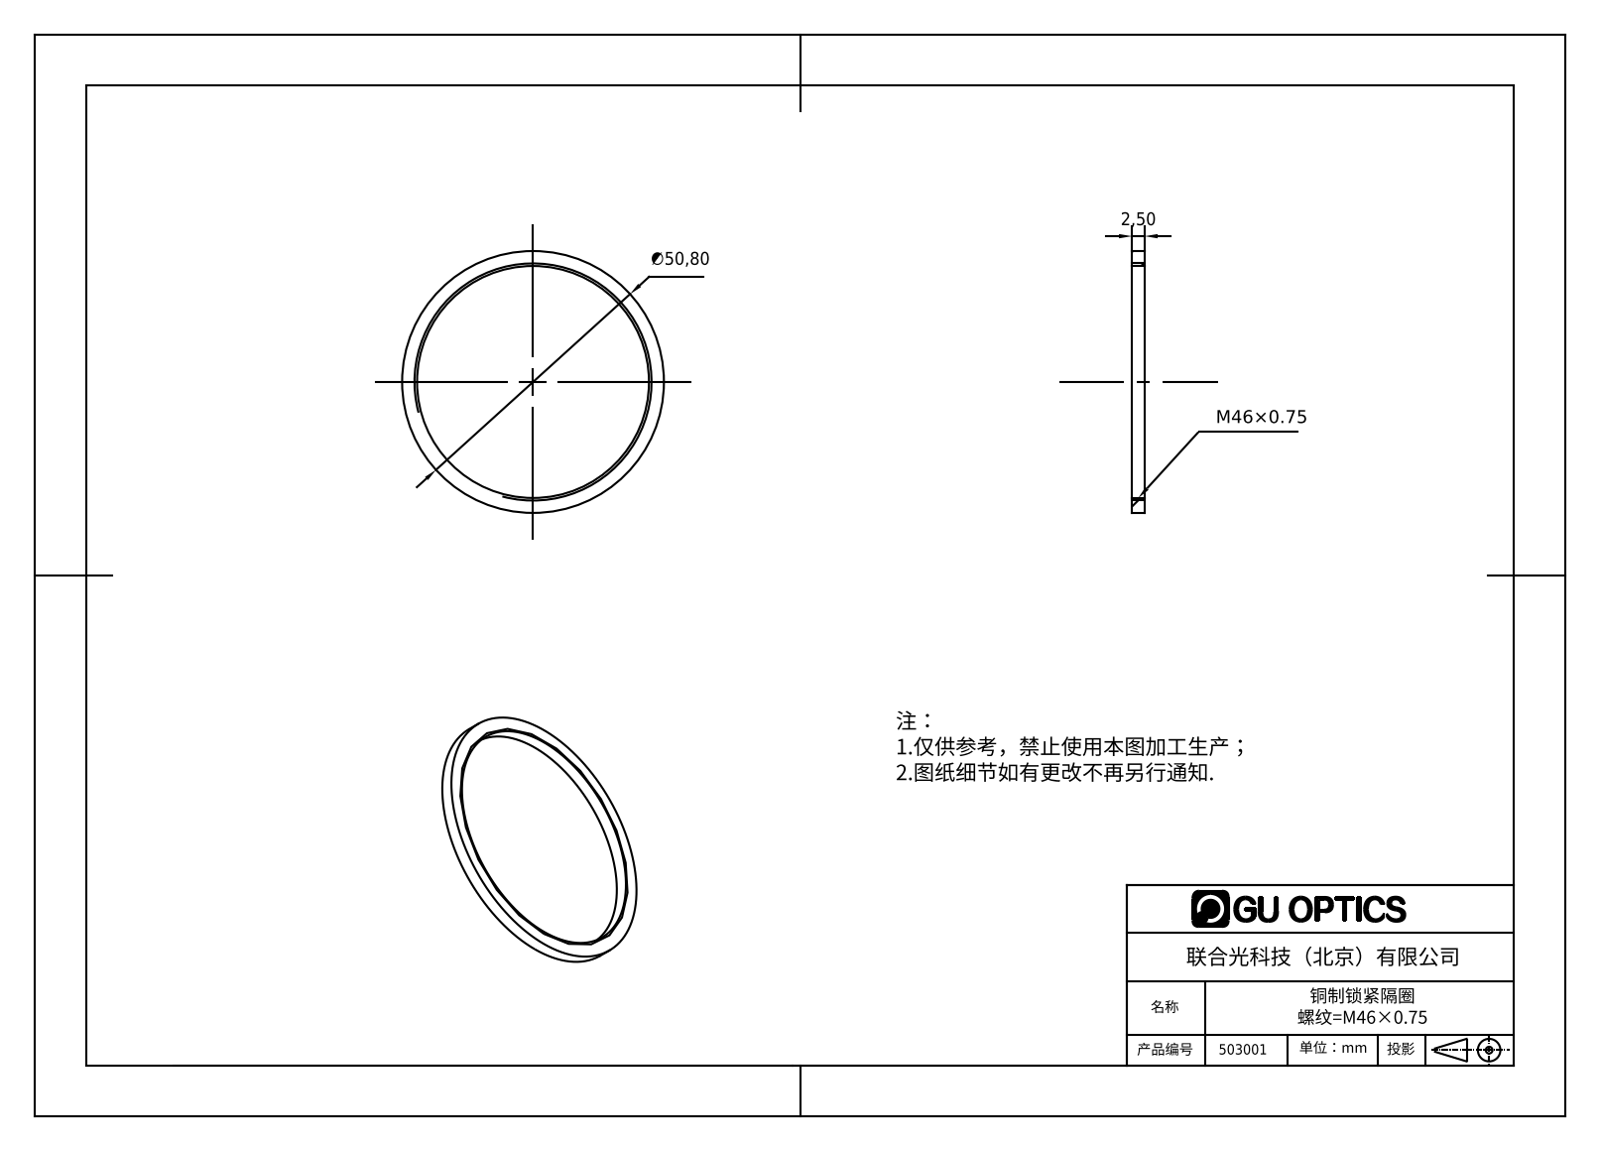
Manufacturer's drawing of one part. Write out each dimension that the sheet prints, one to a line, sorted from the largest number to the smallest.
∅50,80
2,50
